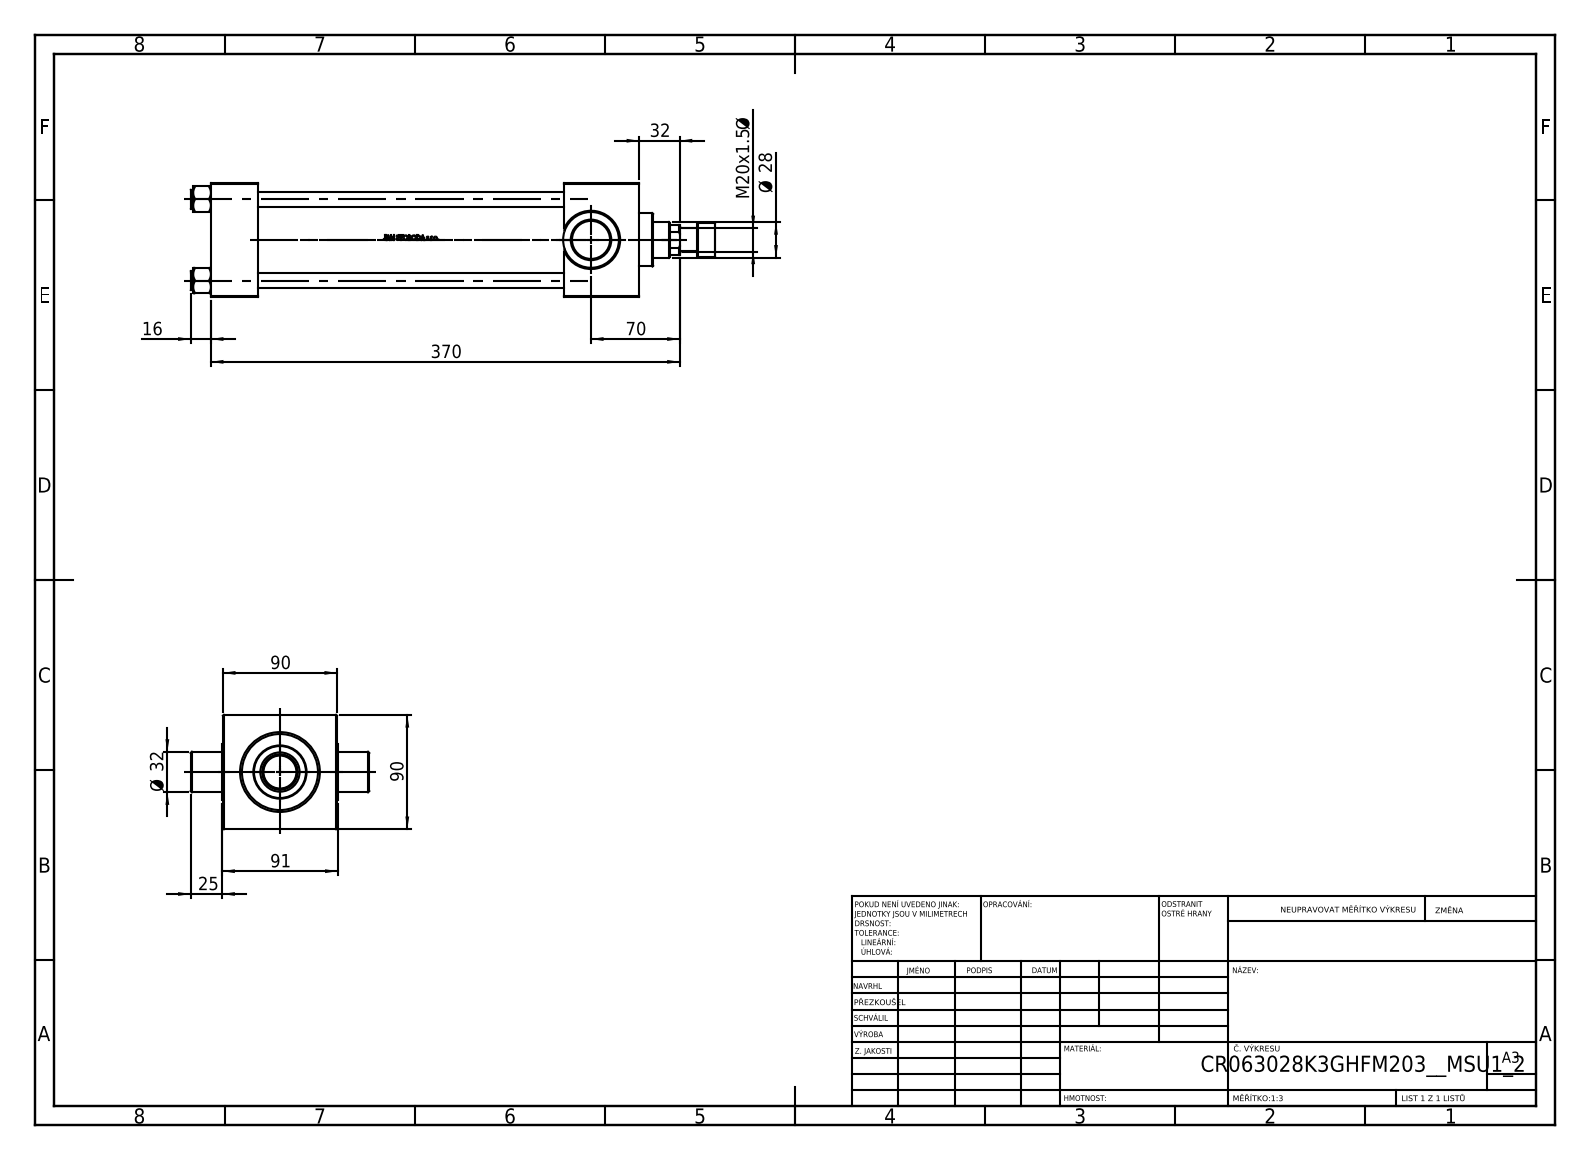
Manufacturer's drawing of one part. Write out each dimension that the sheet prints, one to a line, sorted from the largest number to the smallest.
370
91
90
90
70
32
Ø 32
Ø 28
25
M20x1.5 Ø
16
